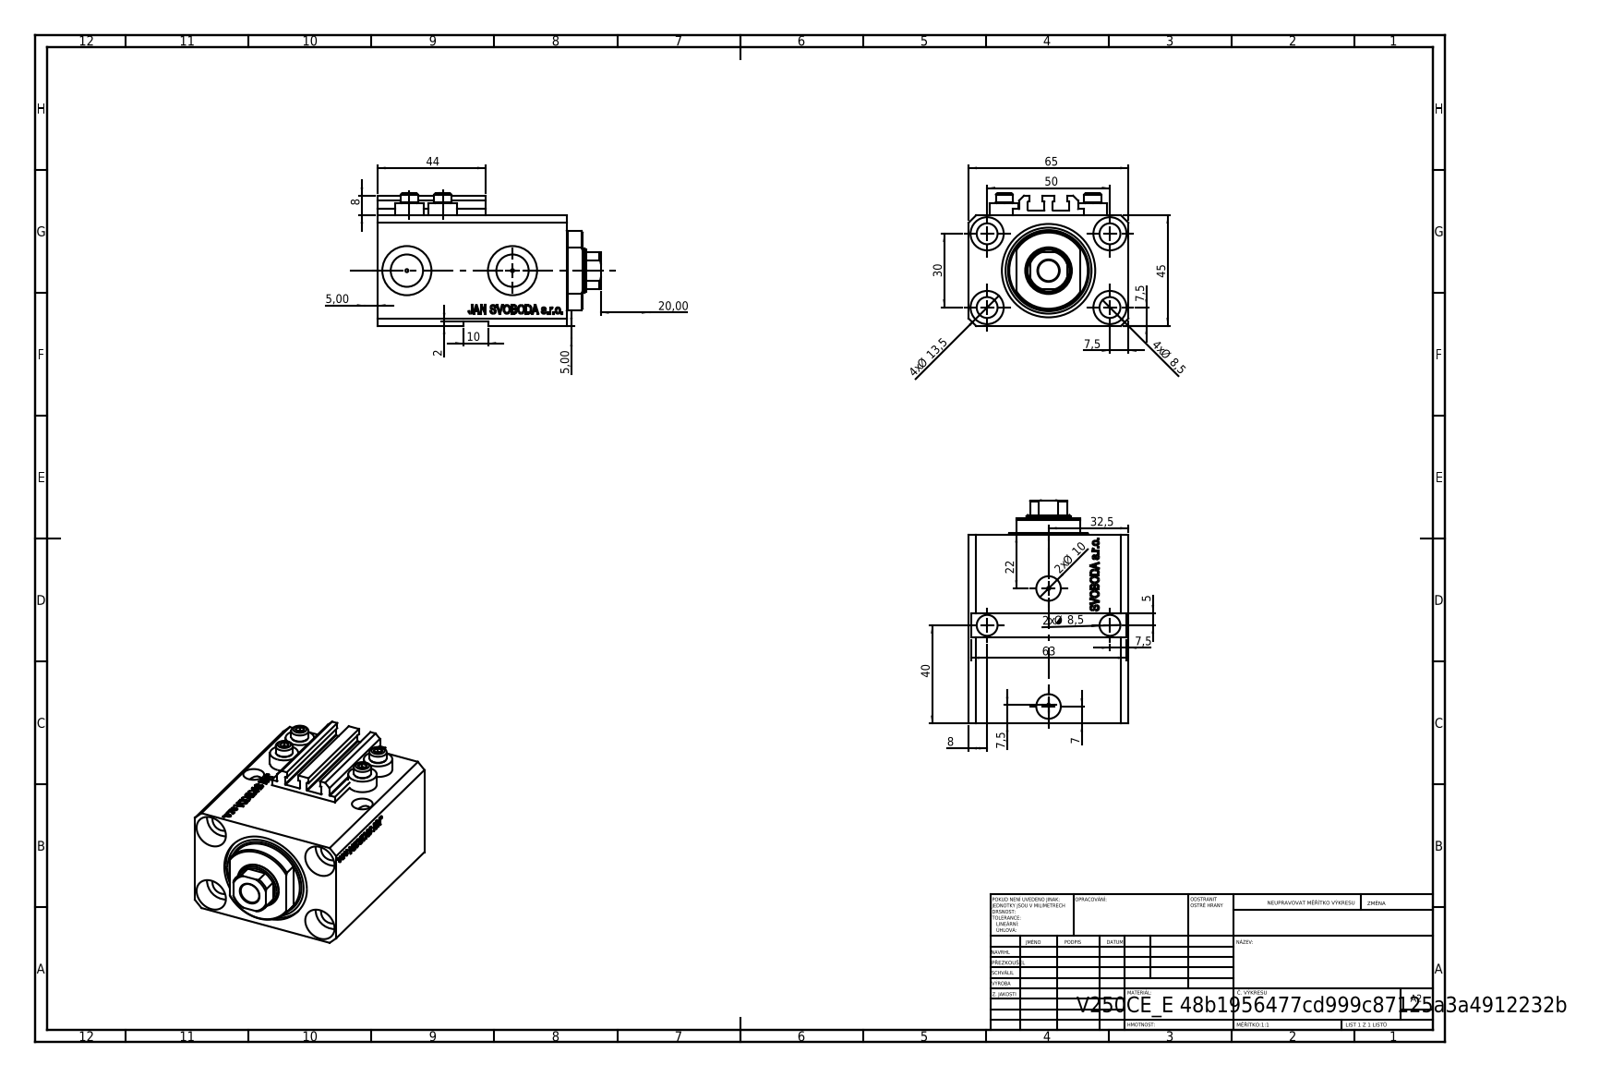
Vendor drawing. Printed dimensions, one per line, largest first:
65
63
50
45
44
40
32,5
30
22
20,00
4x Ø 13,5
10
2x Ø 10
4x Ø 8,5
2x Ø 8,5
8
8
7,5
7,5
7,5
7,5
7
5,00
5,00
5
2
